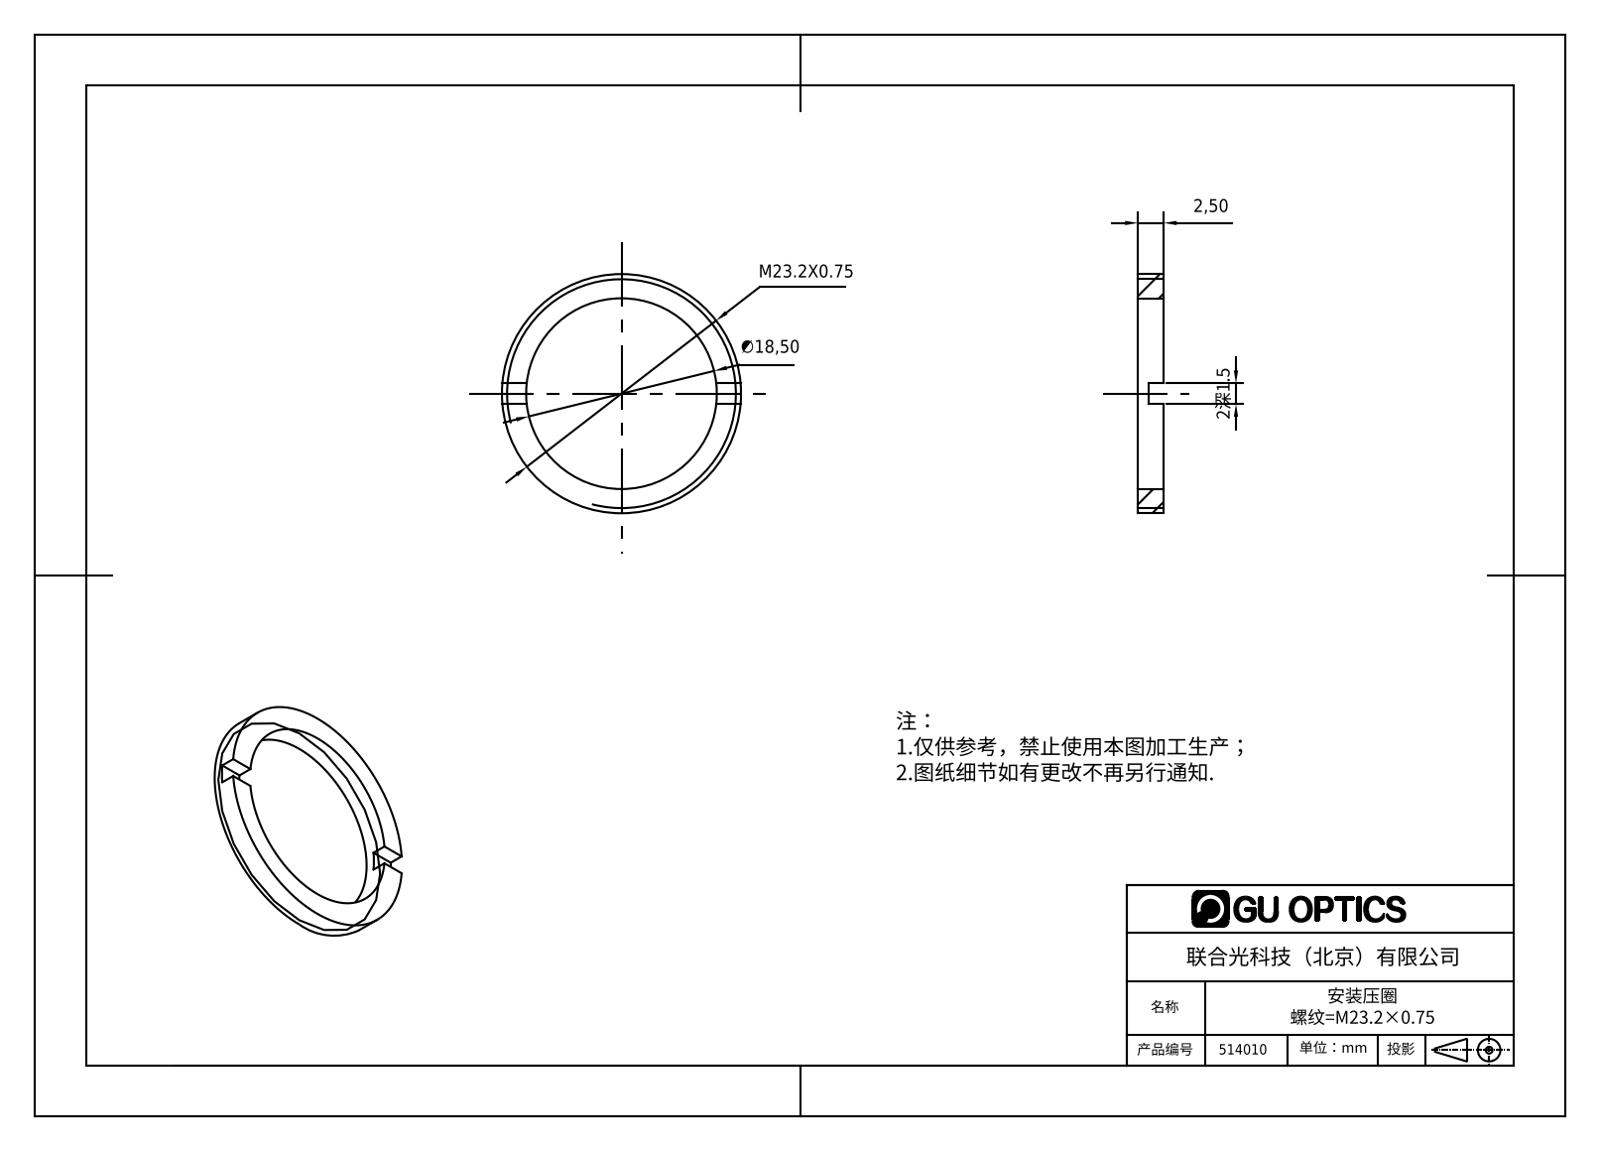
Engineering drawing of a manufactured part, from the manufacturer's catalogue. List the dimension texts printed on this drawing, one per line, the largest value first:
M23.2X0.75
∅18,50
2,50
2深1.5
